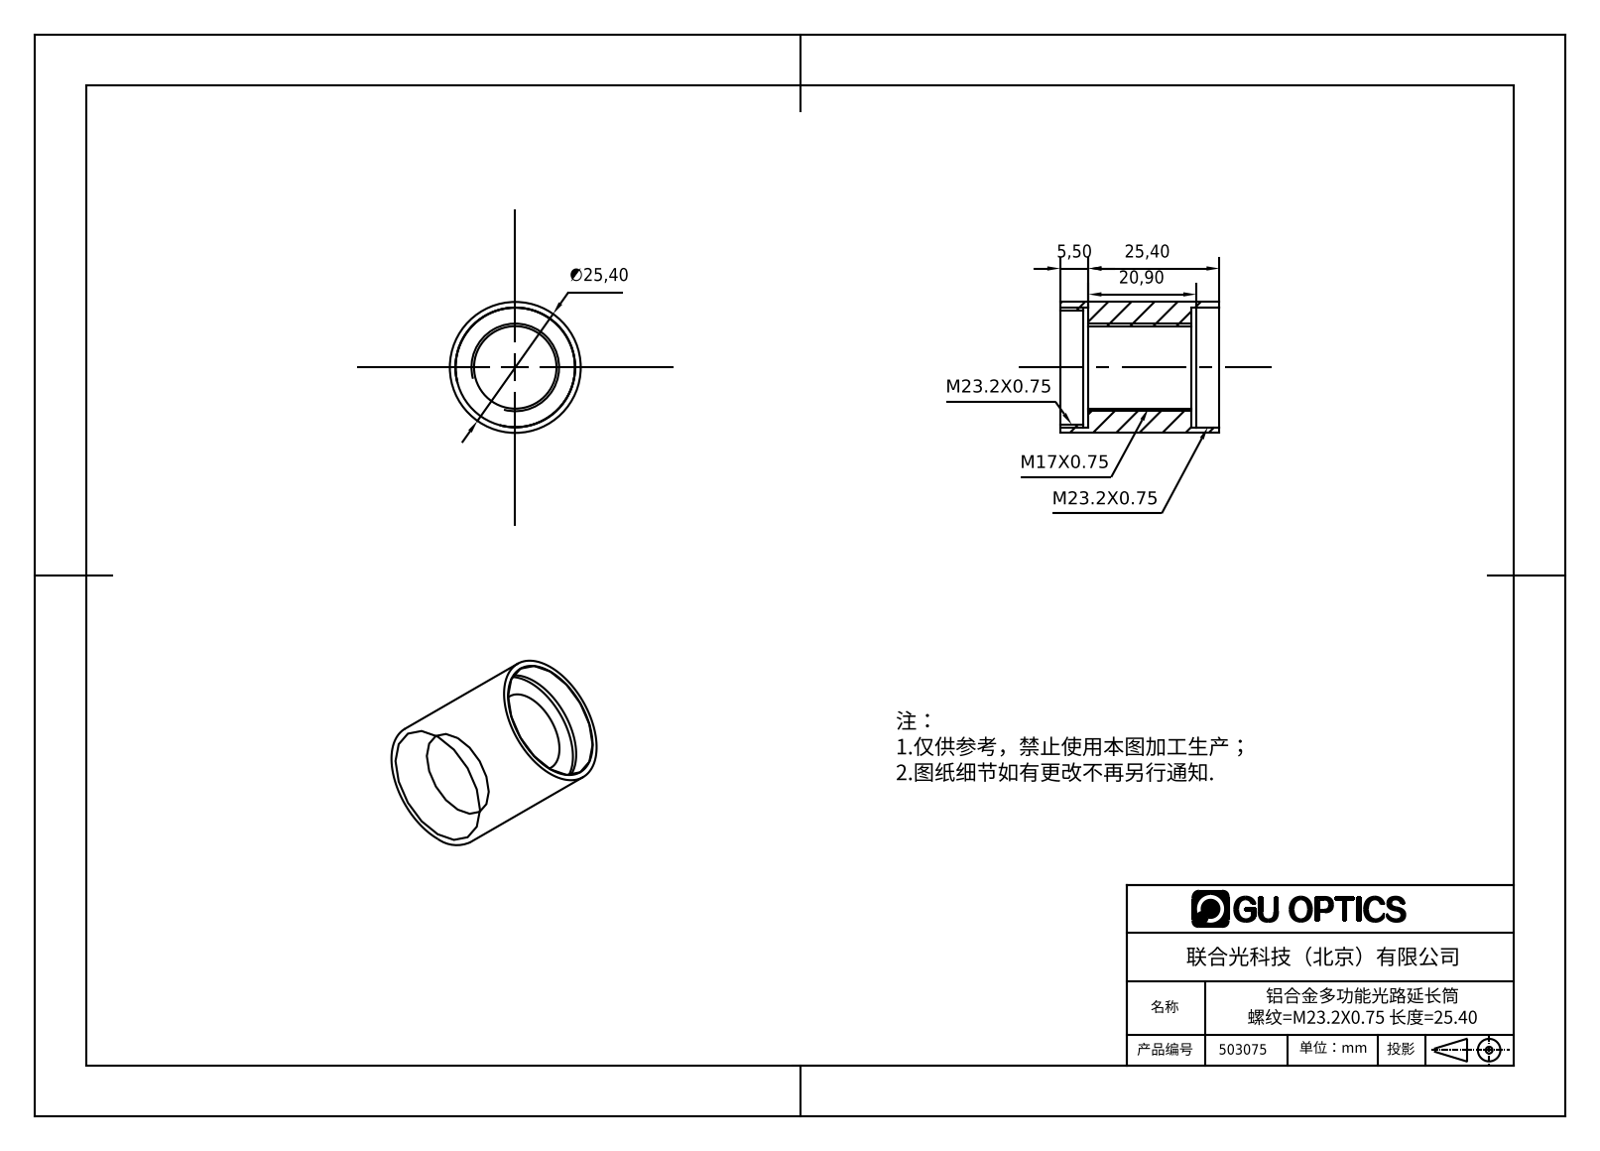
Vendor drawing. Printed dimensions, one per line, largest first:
∅25,40
25,40
20,90
5,50
